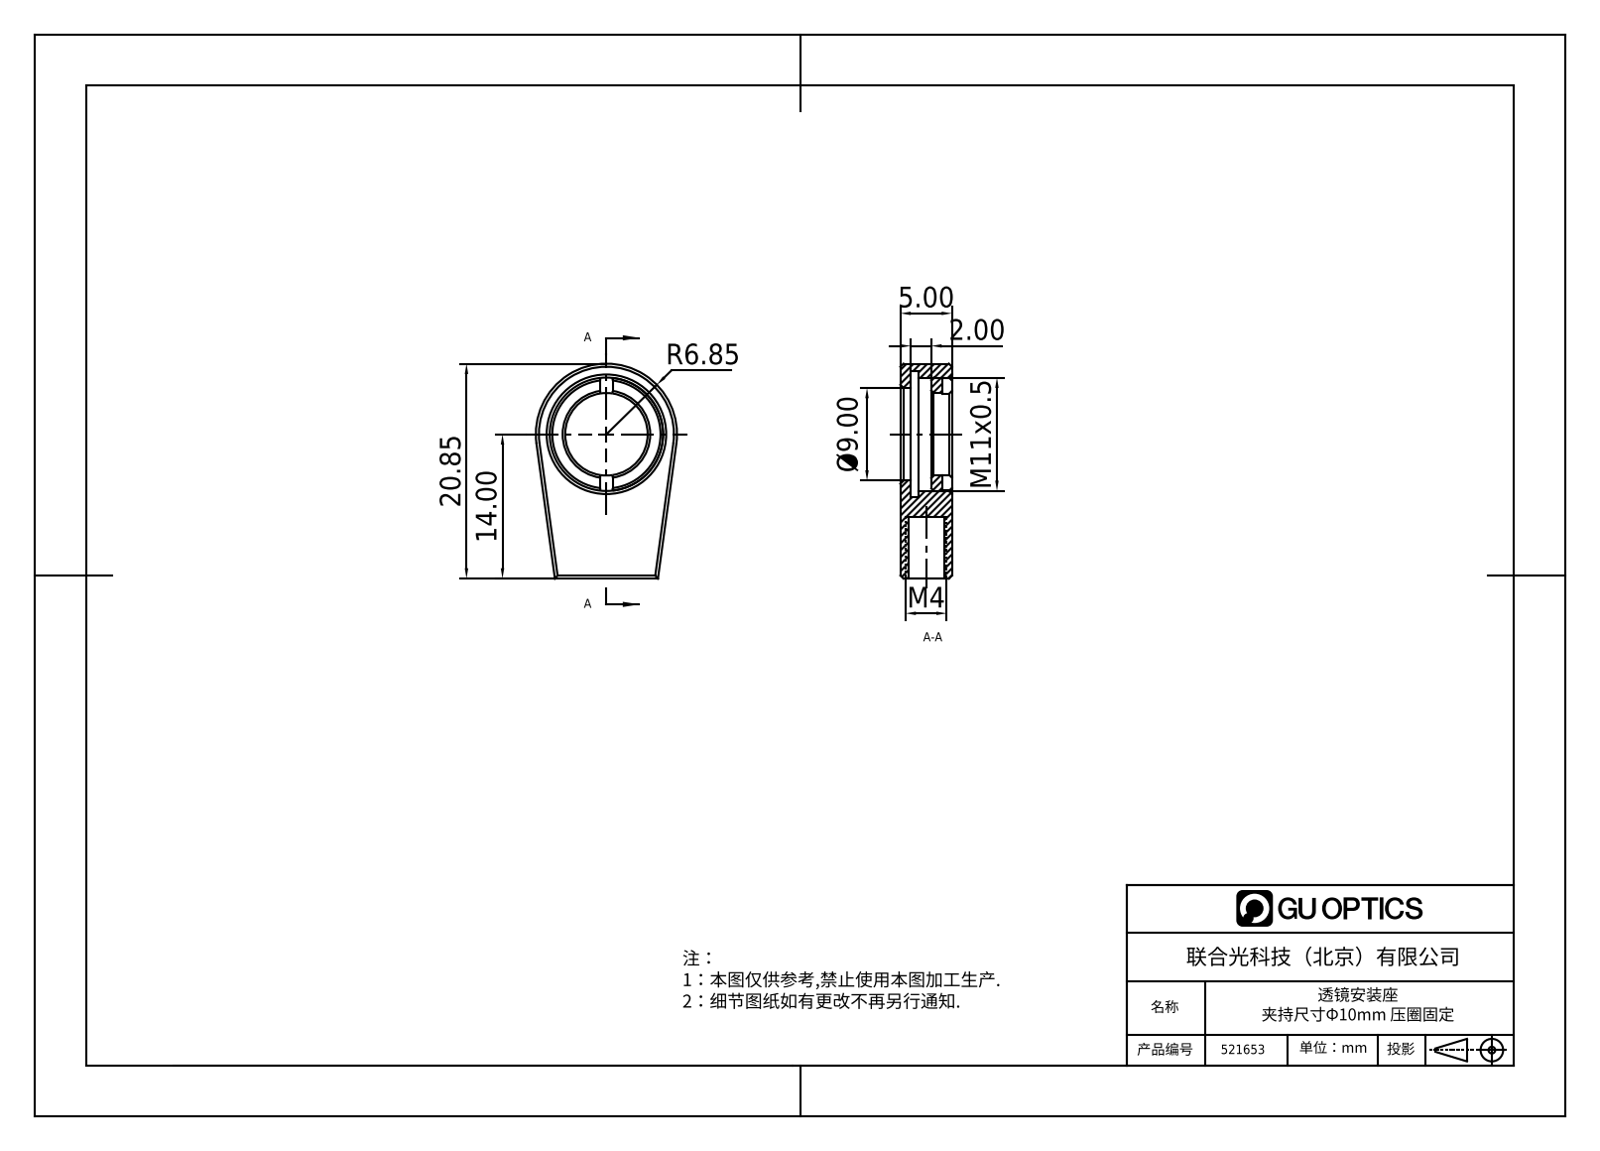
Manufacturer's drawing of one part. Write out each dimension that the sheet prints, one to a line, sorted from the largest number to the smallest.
20.85
14.00
M11x0.5
Ø9.00
R6.85
5.00
M4
2.00
